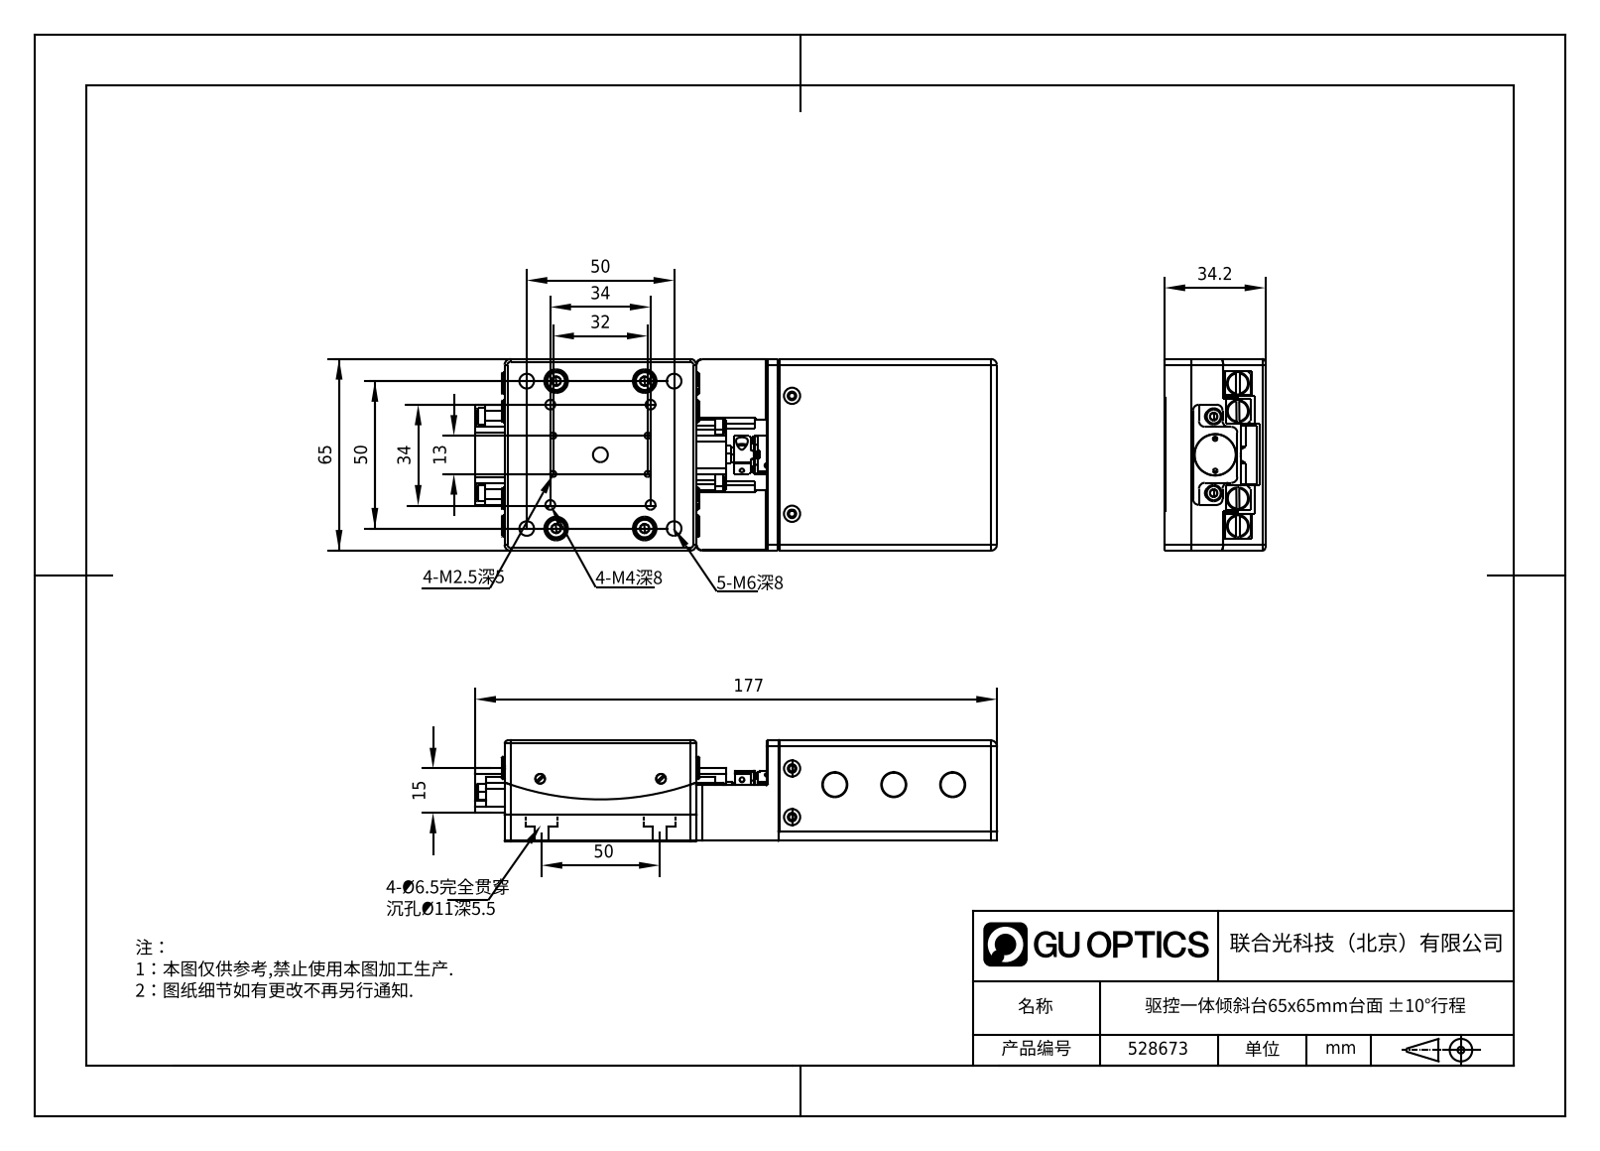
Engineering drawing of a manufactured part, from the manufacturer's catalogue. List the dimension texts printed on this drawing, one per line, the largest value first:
177
65
50
50
50
34.2
34
34
32
15
13
